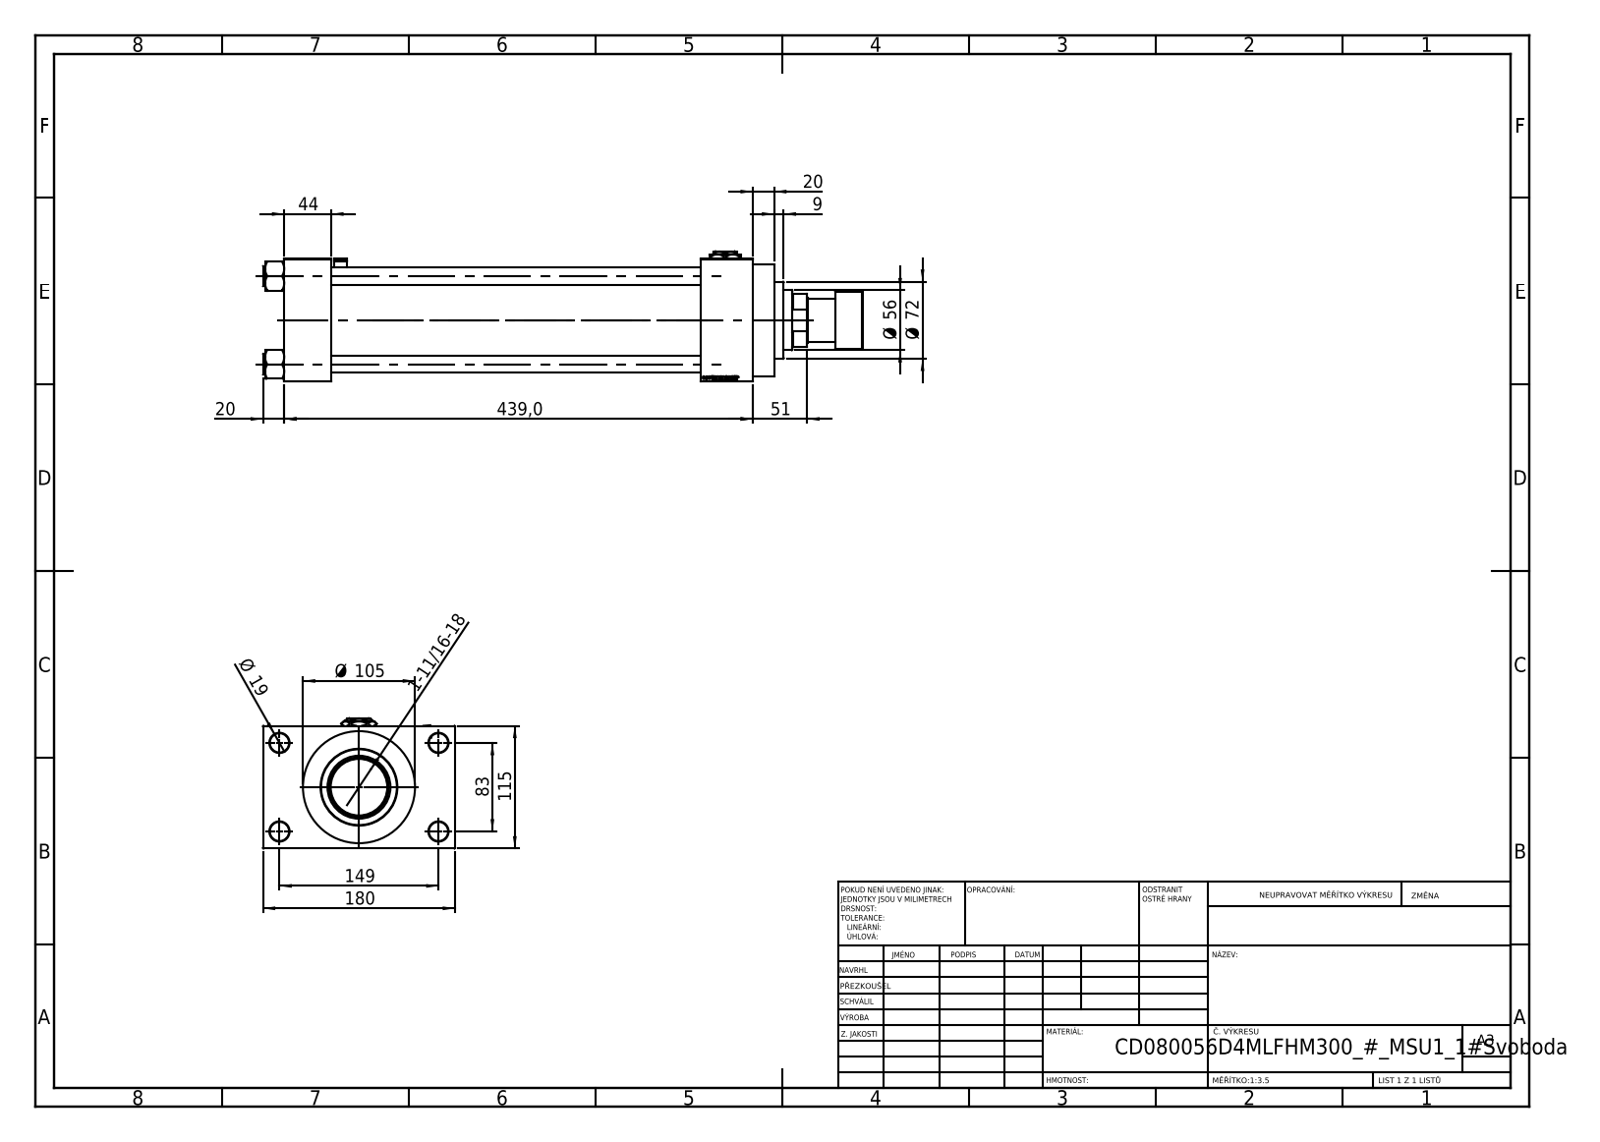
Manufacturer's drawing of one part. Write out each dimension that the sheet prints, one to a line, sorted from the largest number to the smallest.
439,0
180
149
115
Ø 105
83
Ø 72
Ø 56
51
44
20
20
Ø 19
9
1-11/16-18
